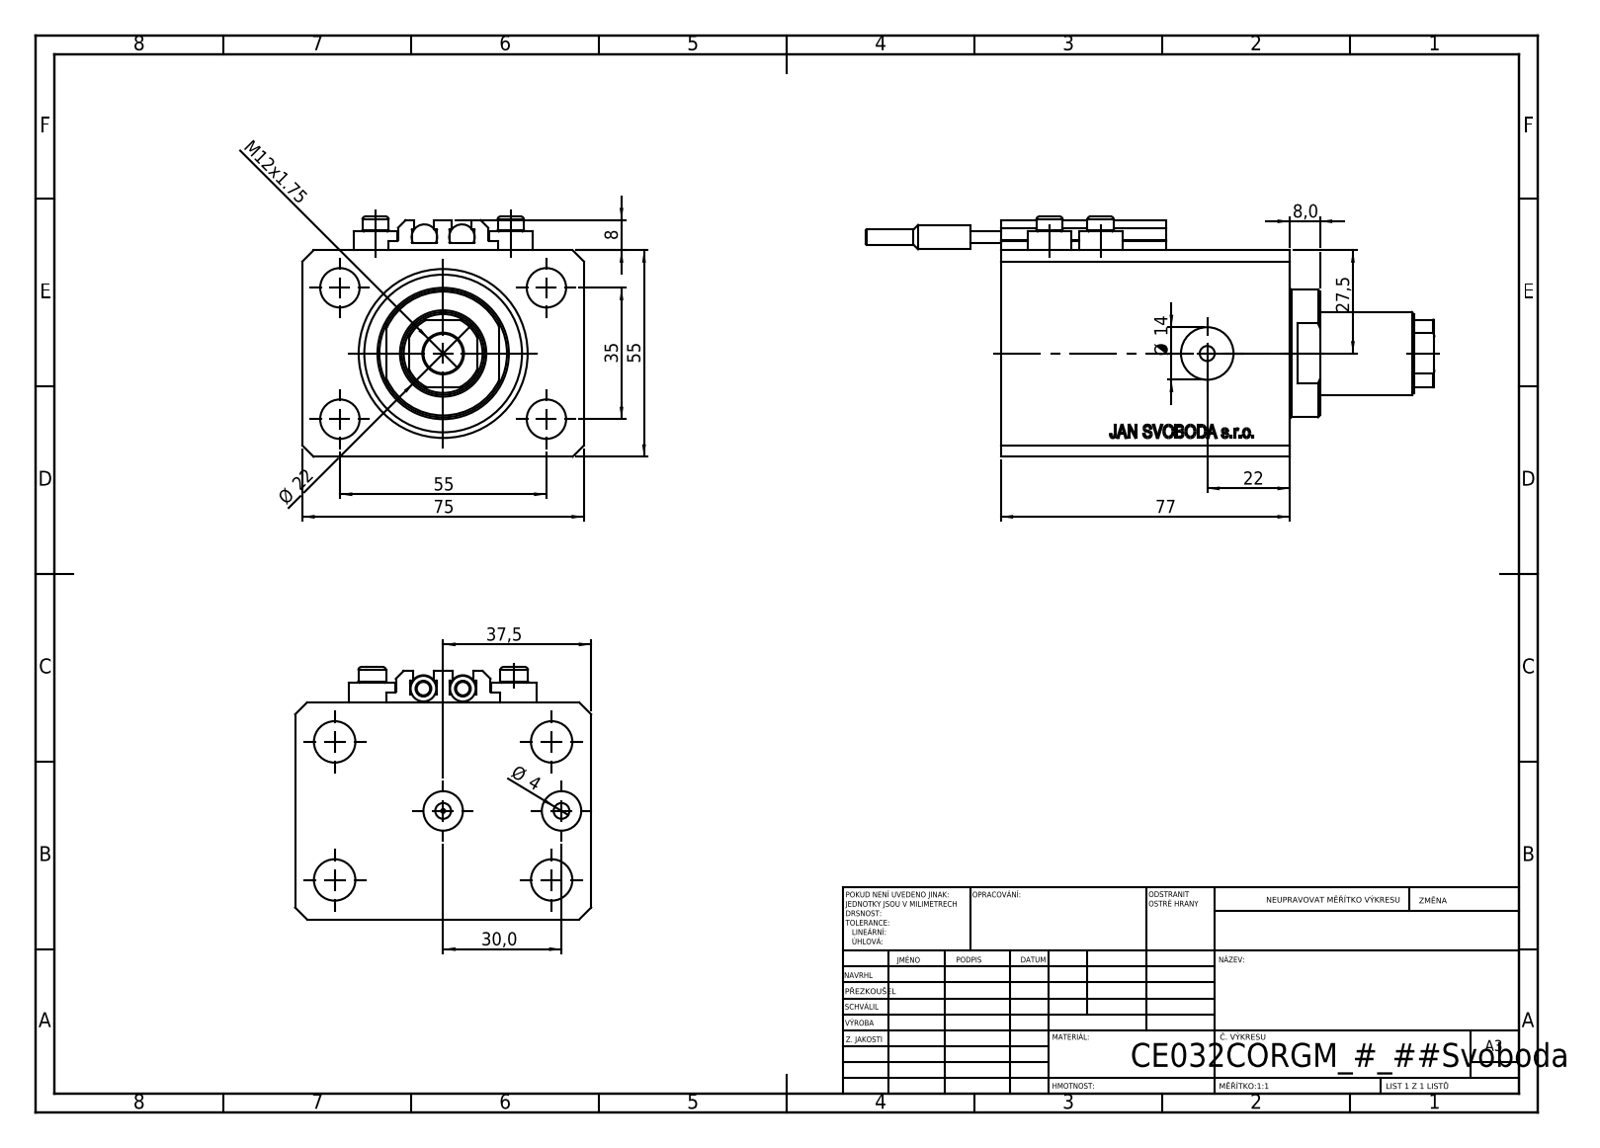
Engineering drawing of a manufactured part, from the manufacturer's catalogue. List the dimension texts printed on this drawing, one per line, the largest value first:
77
75
55
55
37,5
35
30,0
27,5
Ø 22
22
Ø 14
M12x1.75
8
8,0
Ø 4
